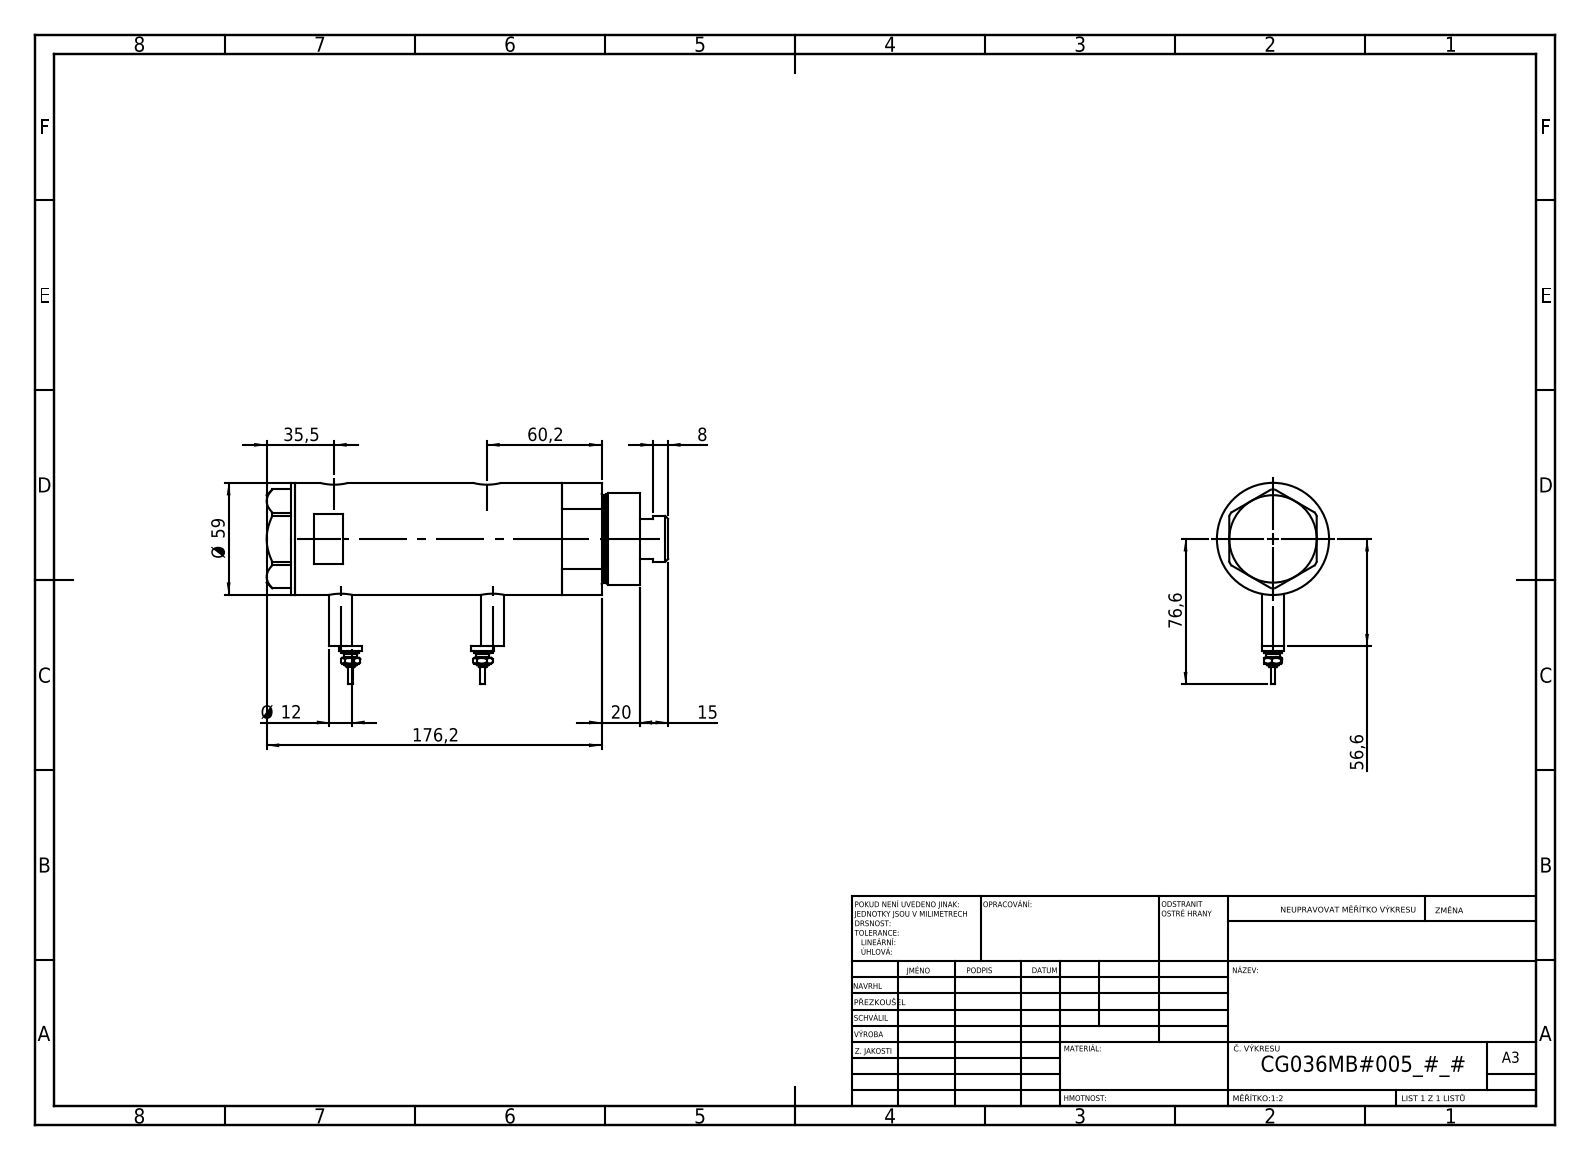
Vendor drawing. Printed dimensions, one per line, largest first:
176,2
76,6
60,2
Ø 59
56,6
35,5
20
15
Ø 12
8
